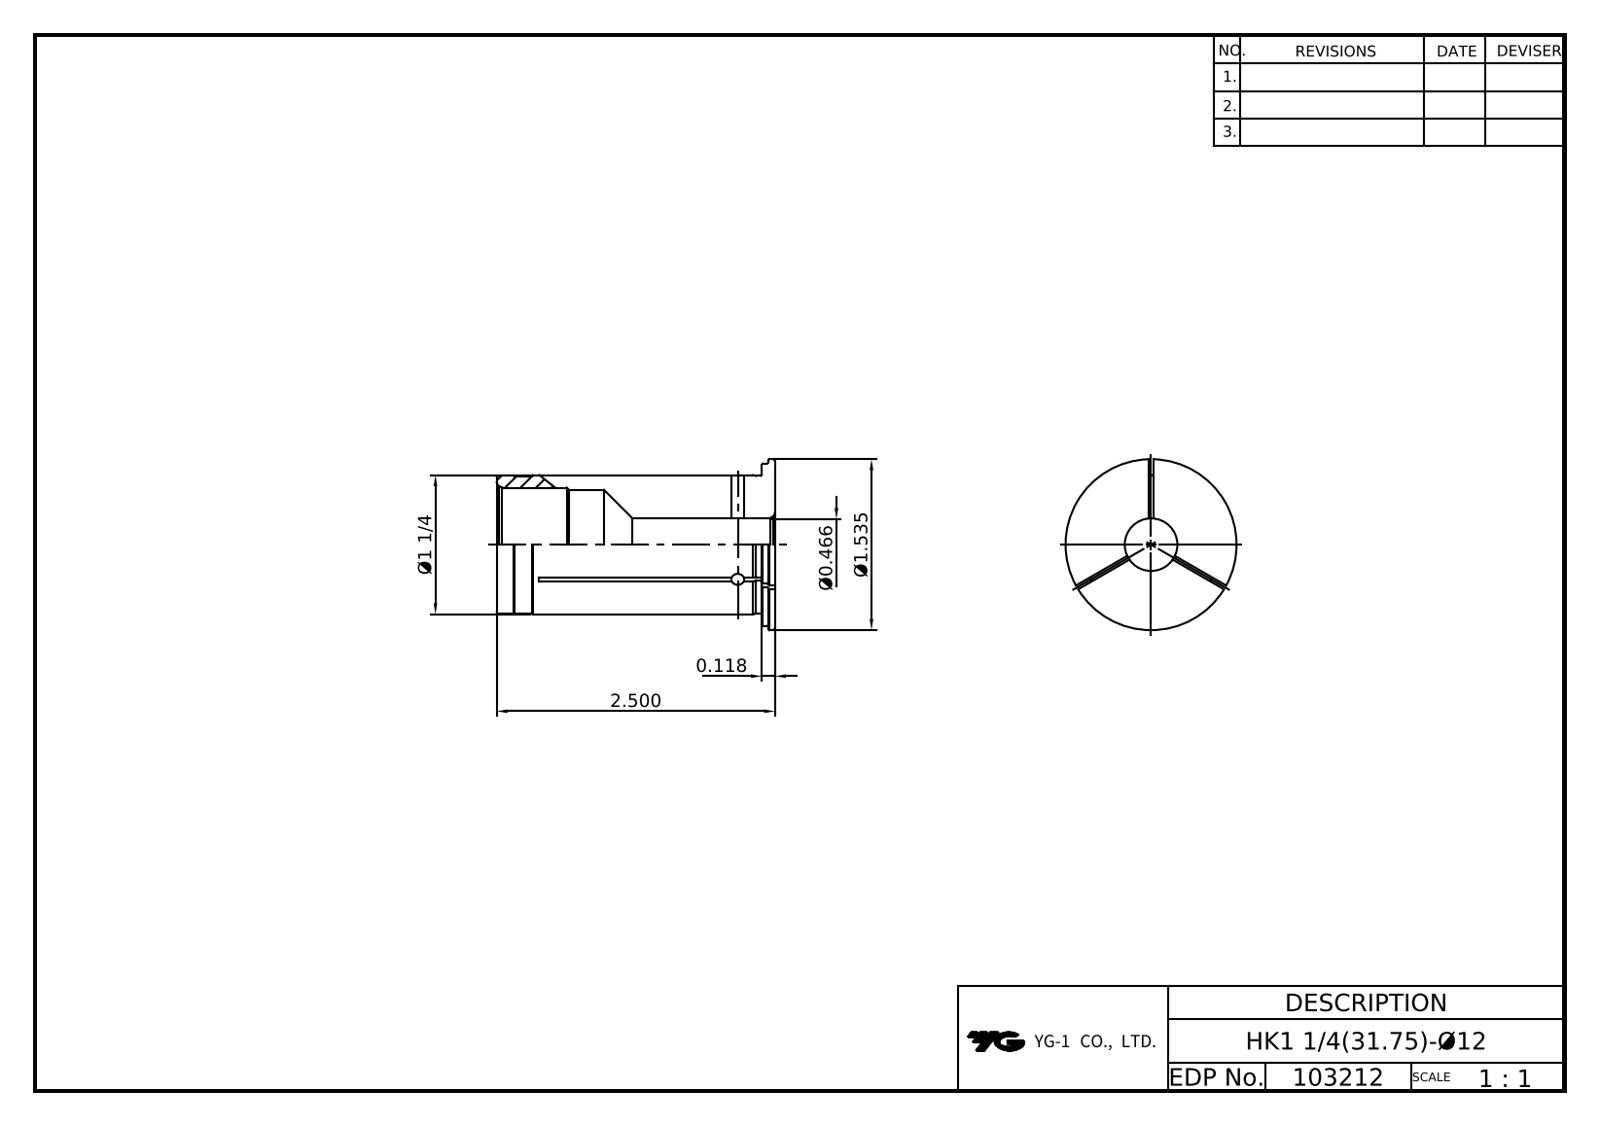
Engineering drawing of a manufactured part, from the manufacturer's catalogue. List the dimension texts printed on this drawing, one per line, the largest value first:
2.500
Ø1.535
Ø1 1/4
0.118
